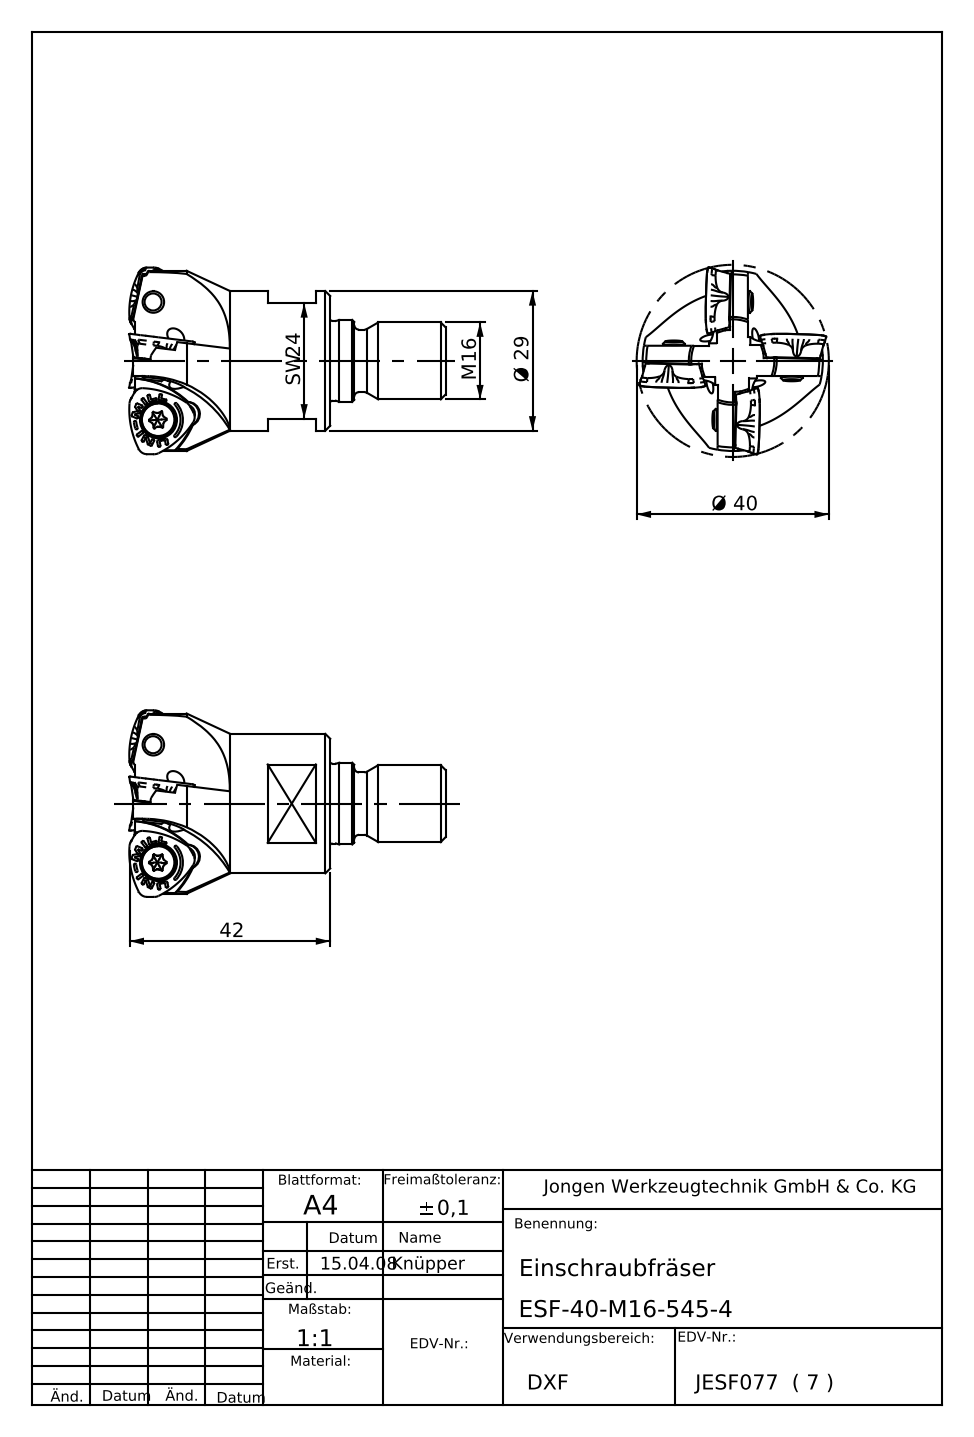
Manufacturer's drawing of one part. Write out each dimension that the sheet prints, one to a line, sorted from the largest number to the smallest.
42
Ø 40
Ø 29
SW 24
M 16
